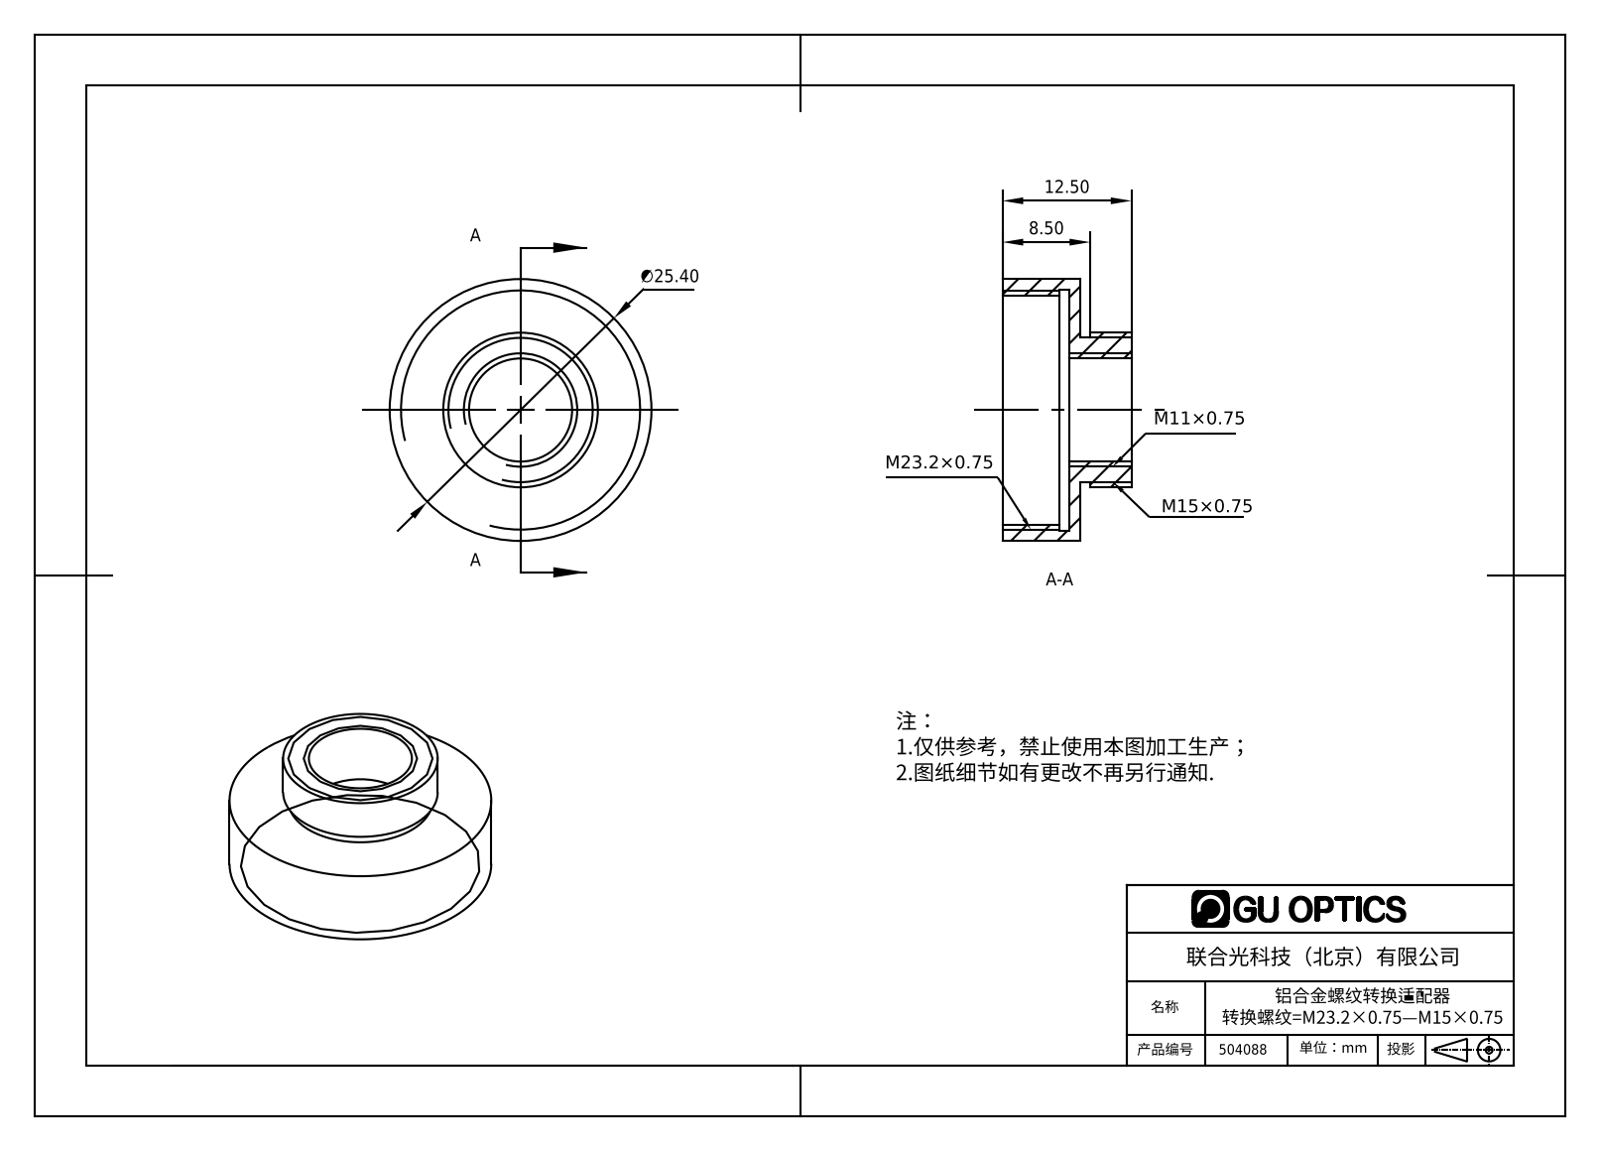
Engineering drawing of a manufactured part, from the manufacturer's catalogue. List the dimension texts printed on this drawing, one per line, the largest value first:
∅25.40
12.50
8.50
